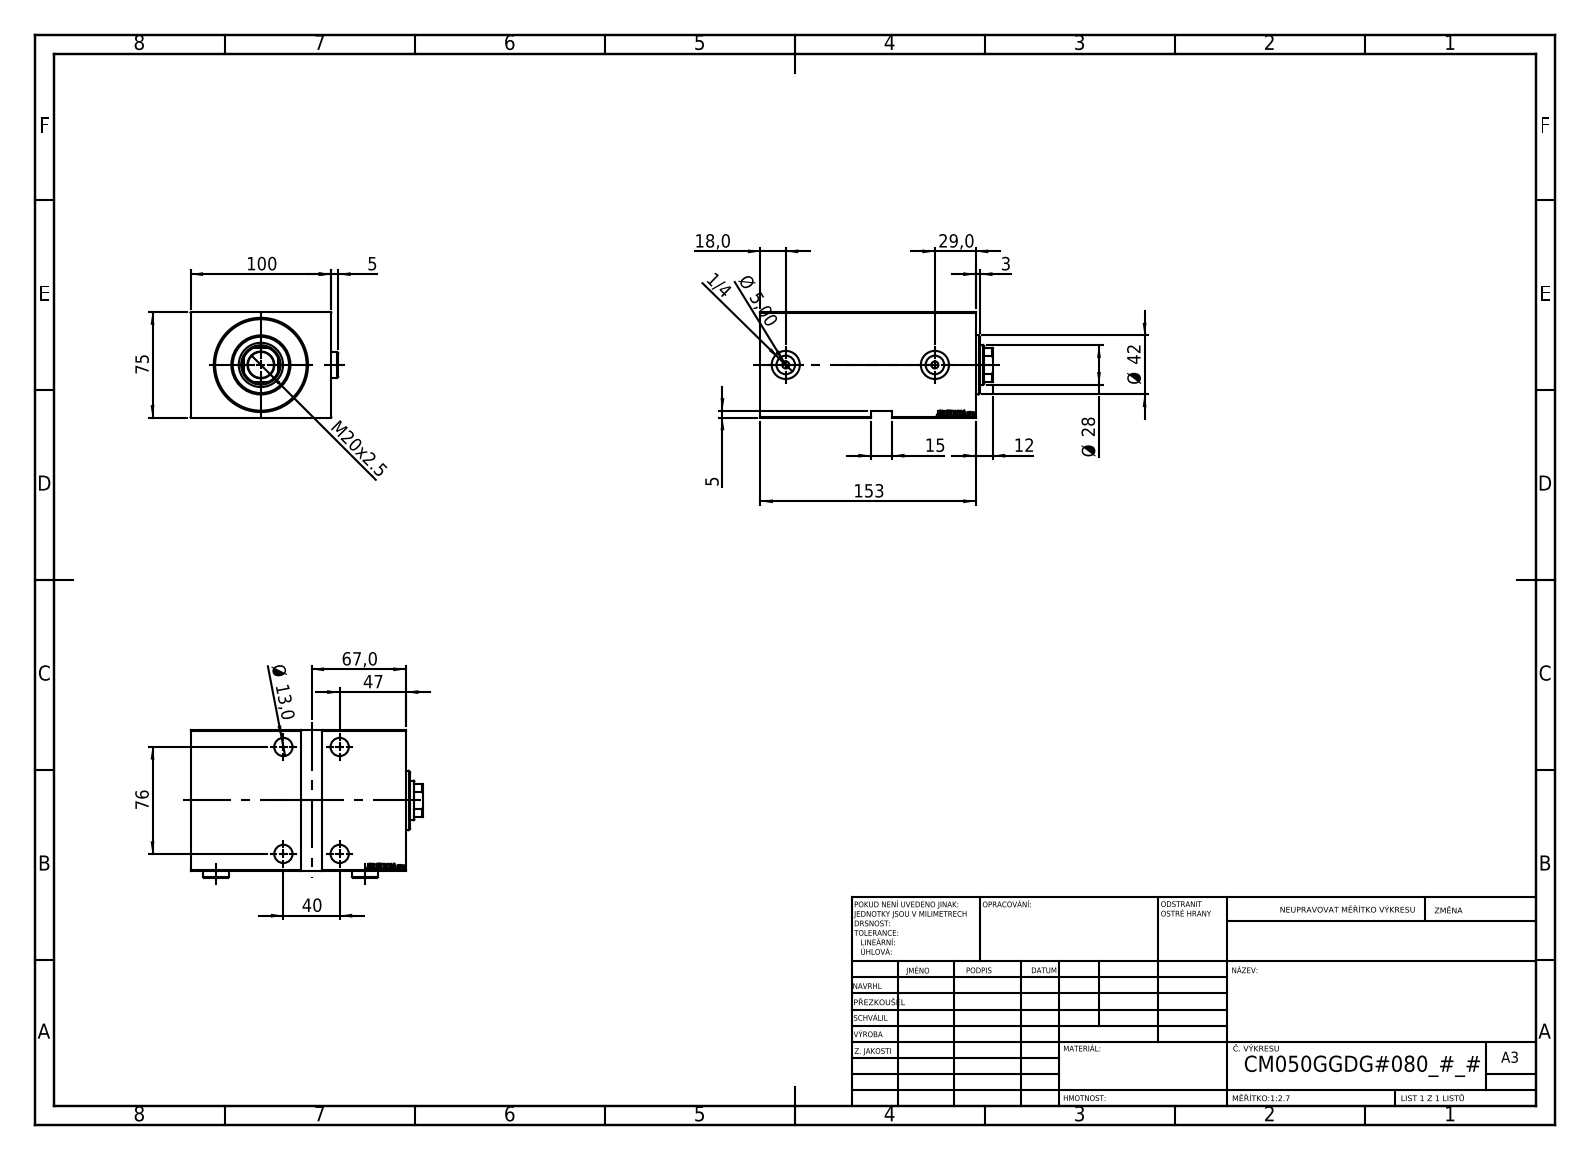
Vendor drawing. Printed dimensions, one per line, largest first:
153
100
76
75
67,0
47
Ø 42
40
29,0
Ø 28
M20x2.5
18,0
15
Ø 13,0
12
5
Ø 5,00
5
3
1/4
